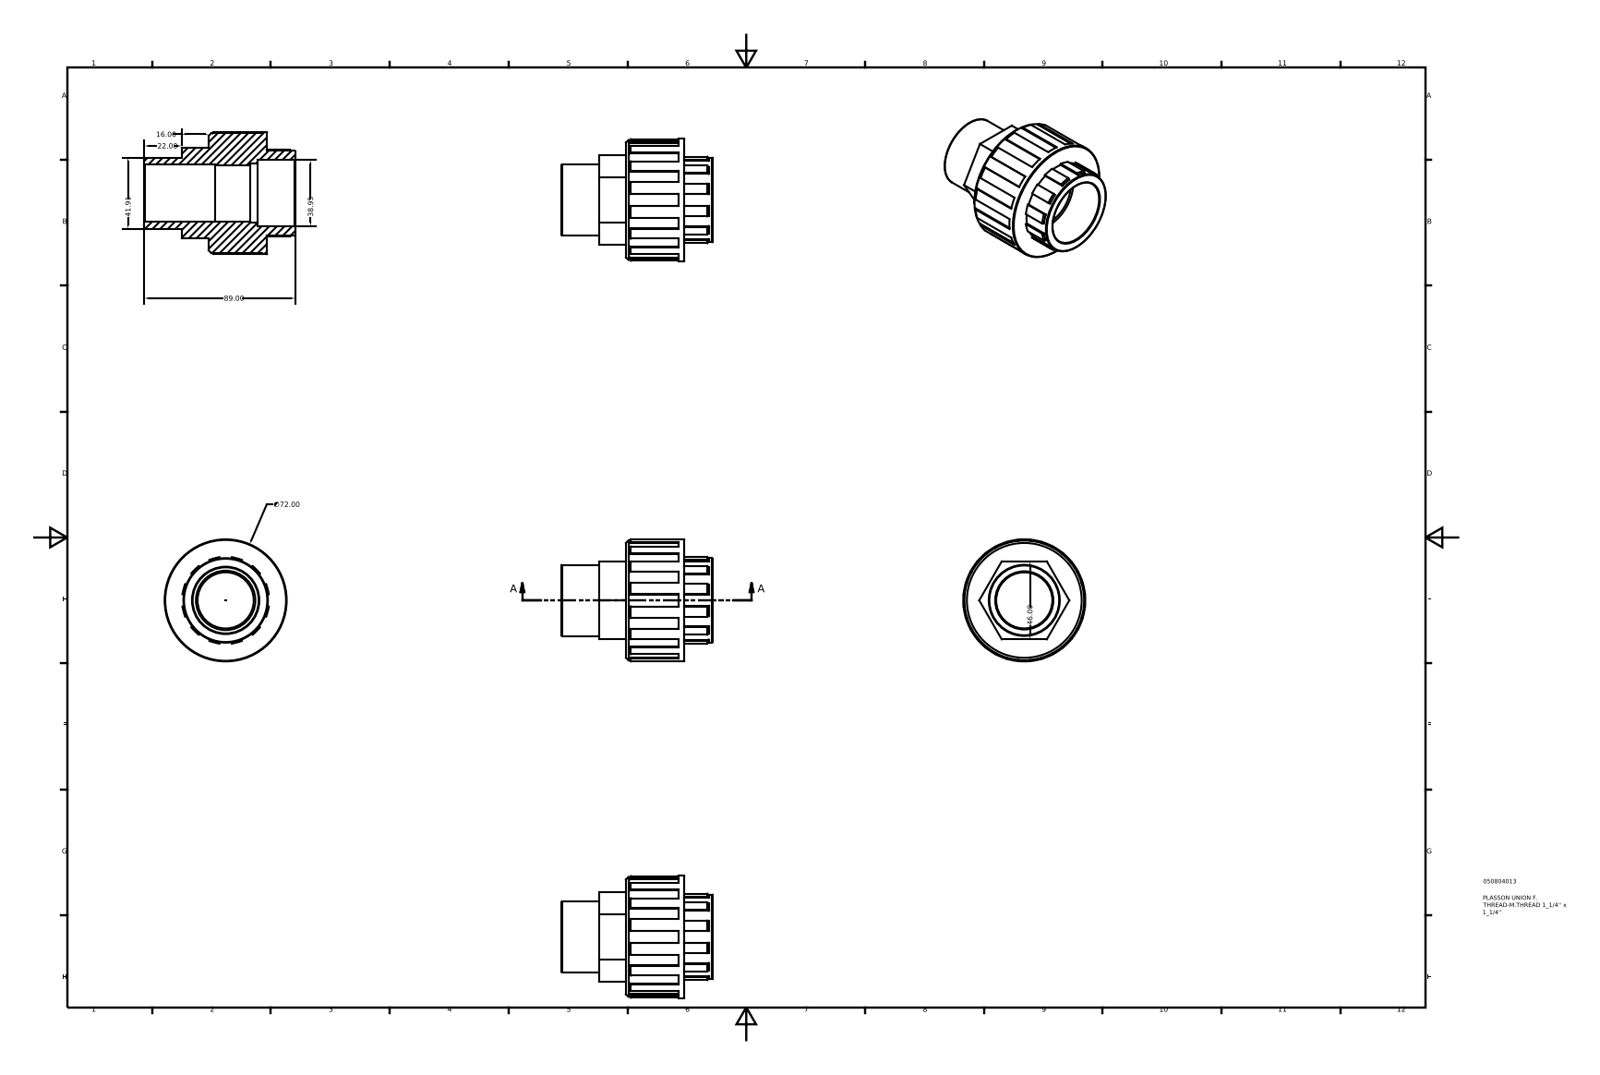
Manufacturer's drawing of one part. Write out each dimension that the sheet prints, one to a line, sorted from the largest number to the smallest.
89.00
∅72.00
46.00
41.91
38.95
22.00
16.00
